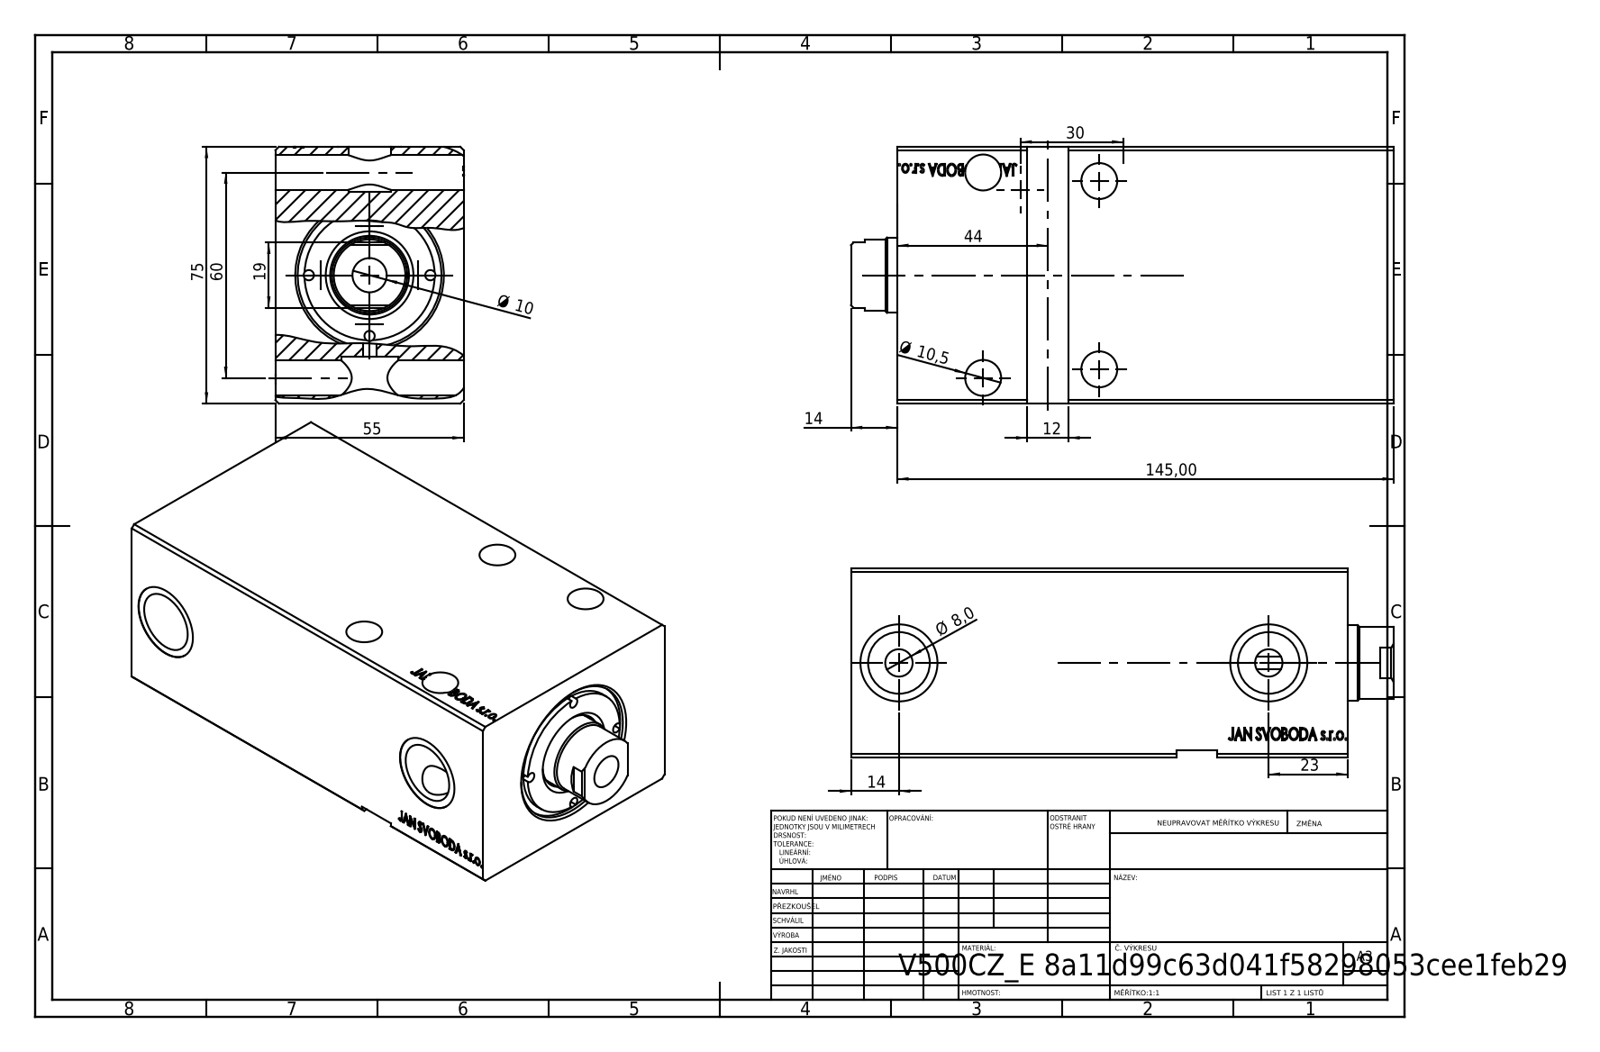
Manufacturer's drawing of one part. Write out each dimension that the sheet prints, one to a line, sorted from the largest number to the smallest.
145,00
75
60
55
44
30
23
19
14
14
12
Ø 10,5
Ø 10
Ø 8,0
